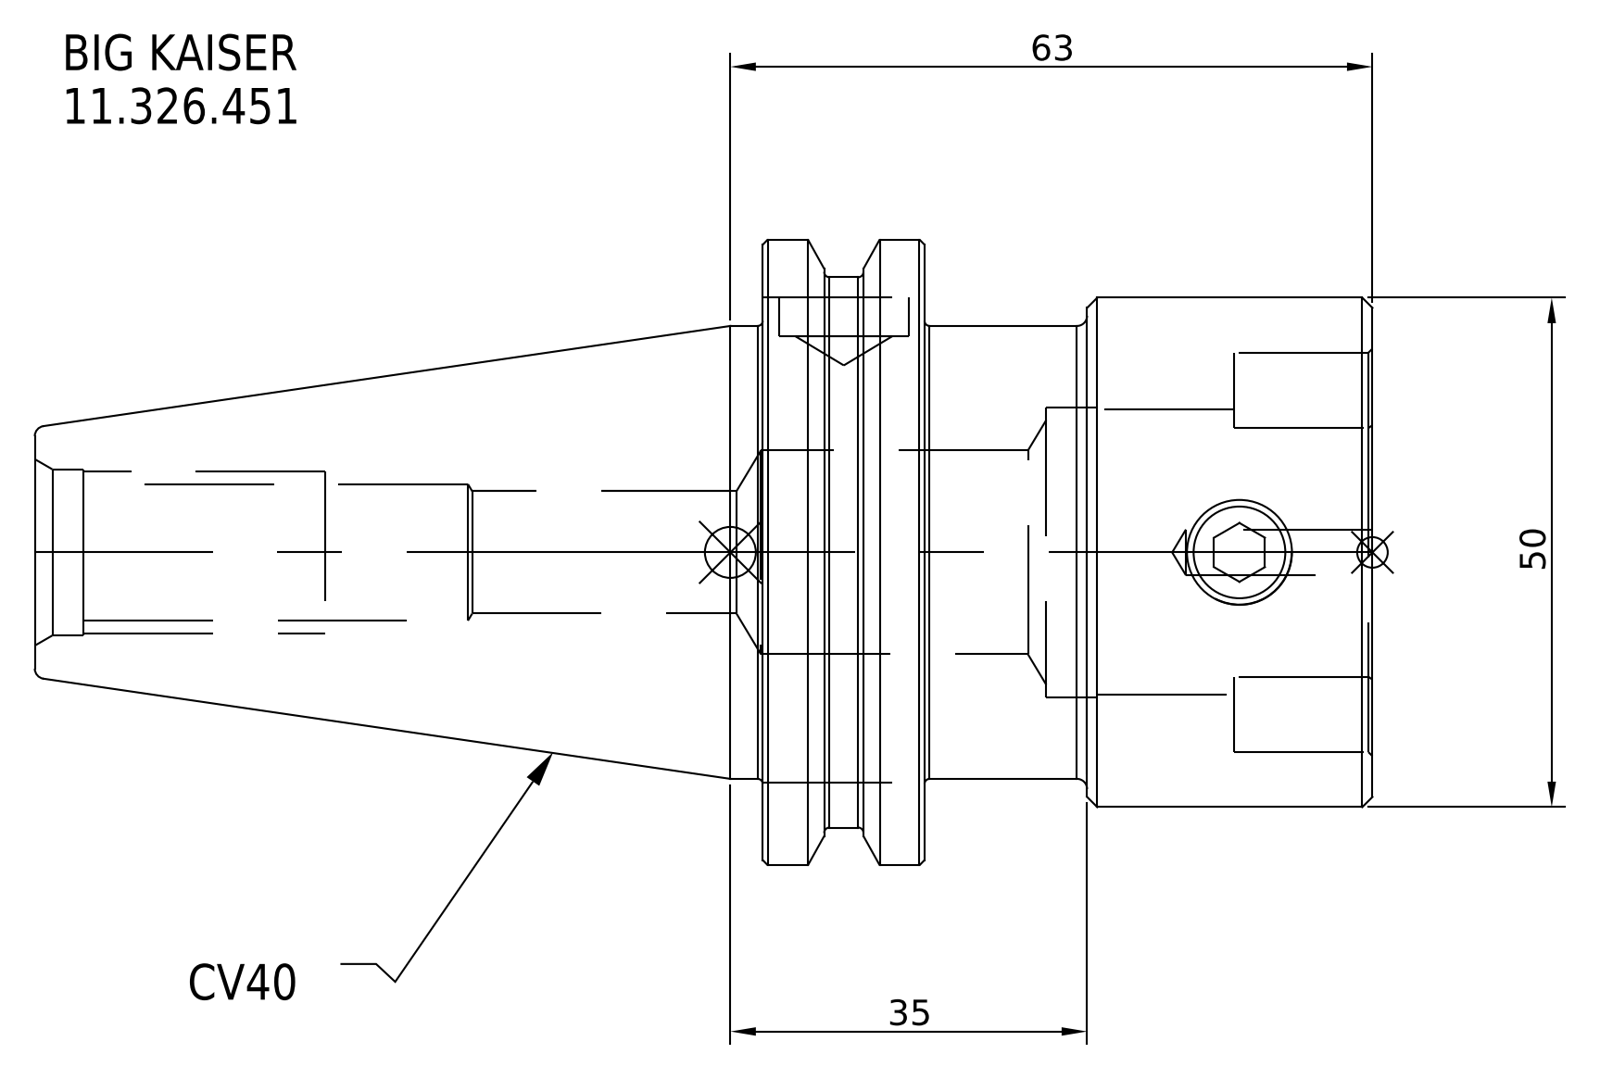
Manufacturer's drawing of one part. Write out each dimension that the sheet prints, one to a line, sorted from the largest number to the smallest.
63
50
35
